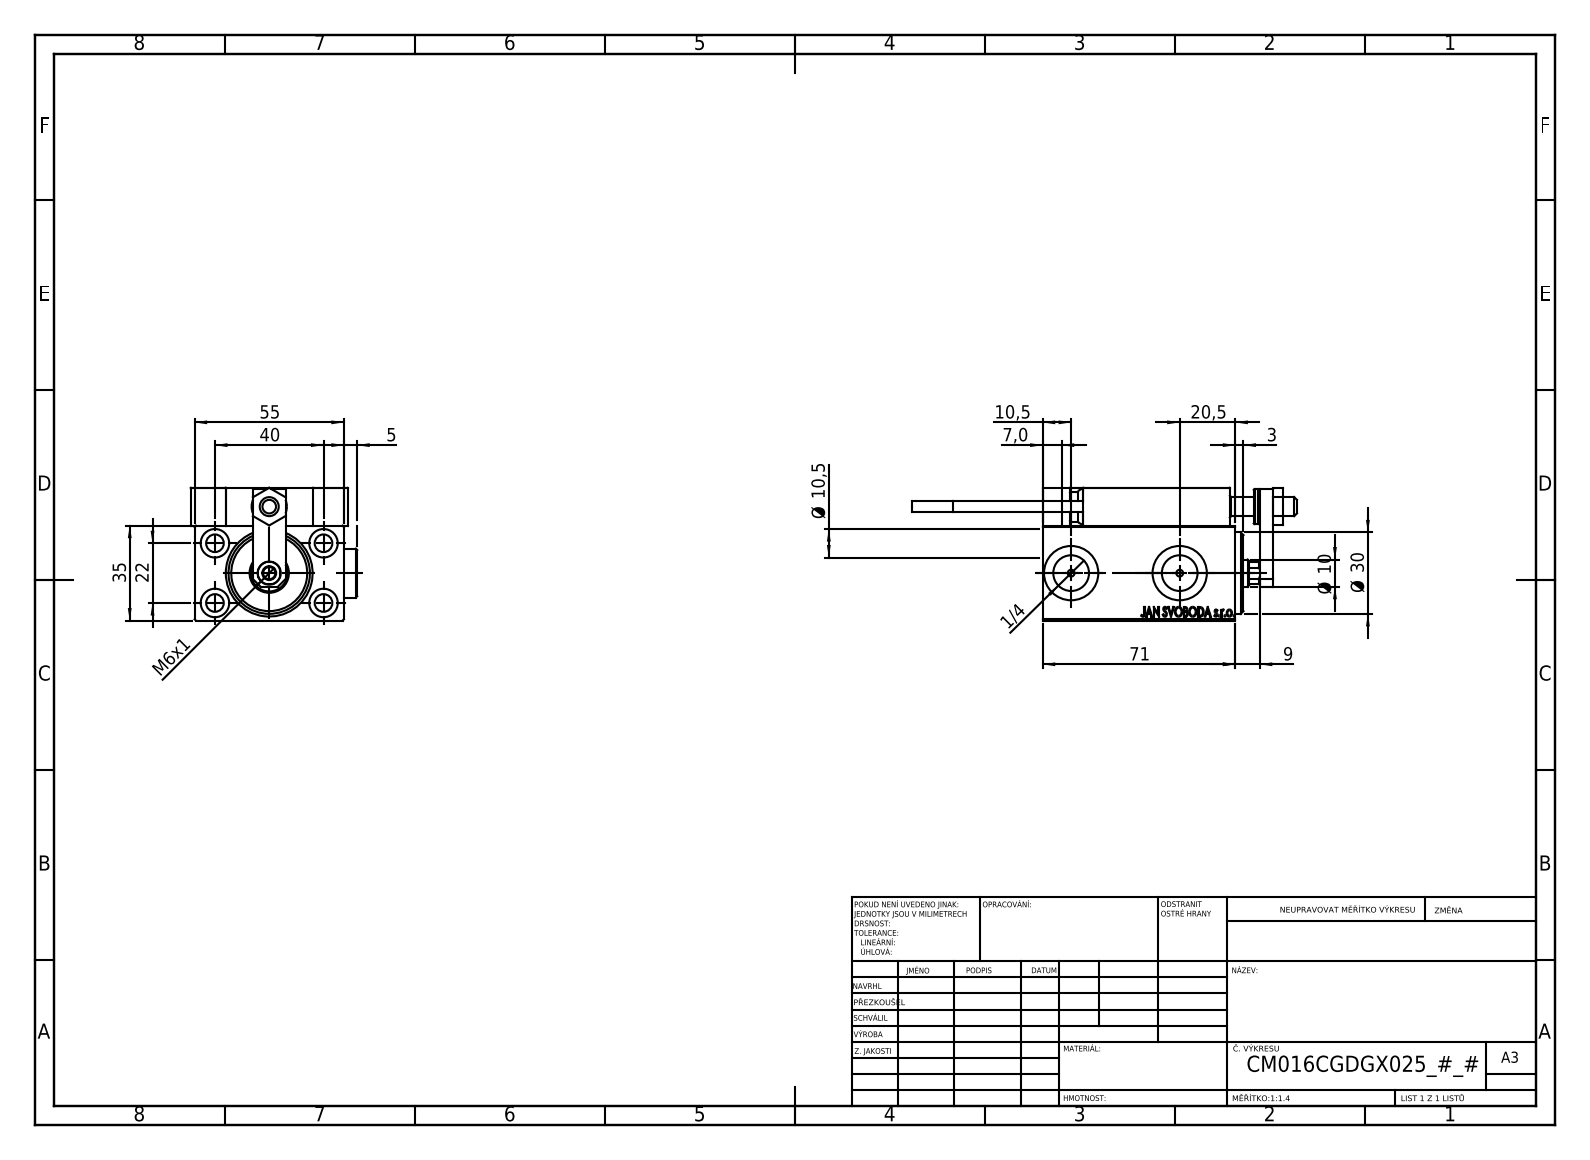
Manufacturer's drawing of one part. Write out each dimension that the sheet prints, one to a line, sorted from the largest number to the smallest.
71
55
40
35
Ø 30
22
20,5
10,5
Ø 10,5
Ø 10
9
7,0
M6x1
5
3
1/4
